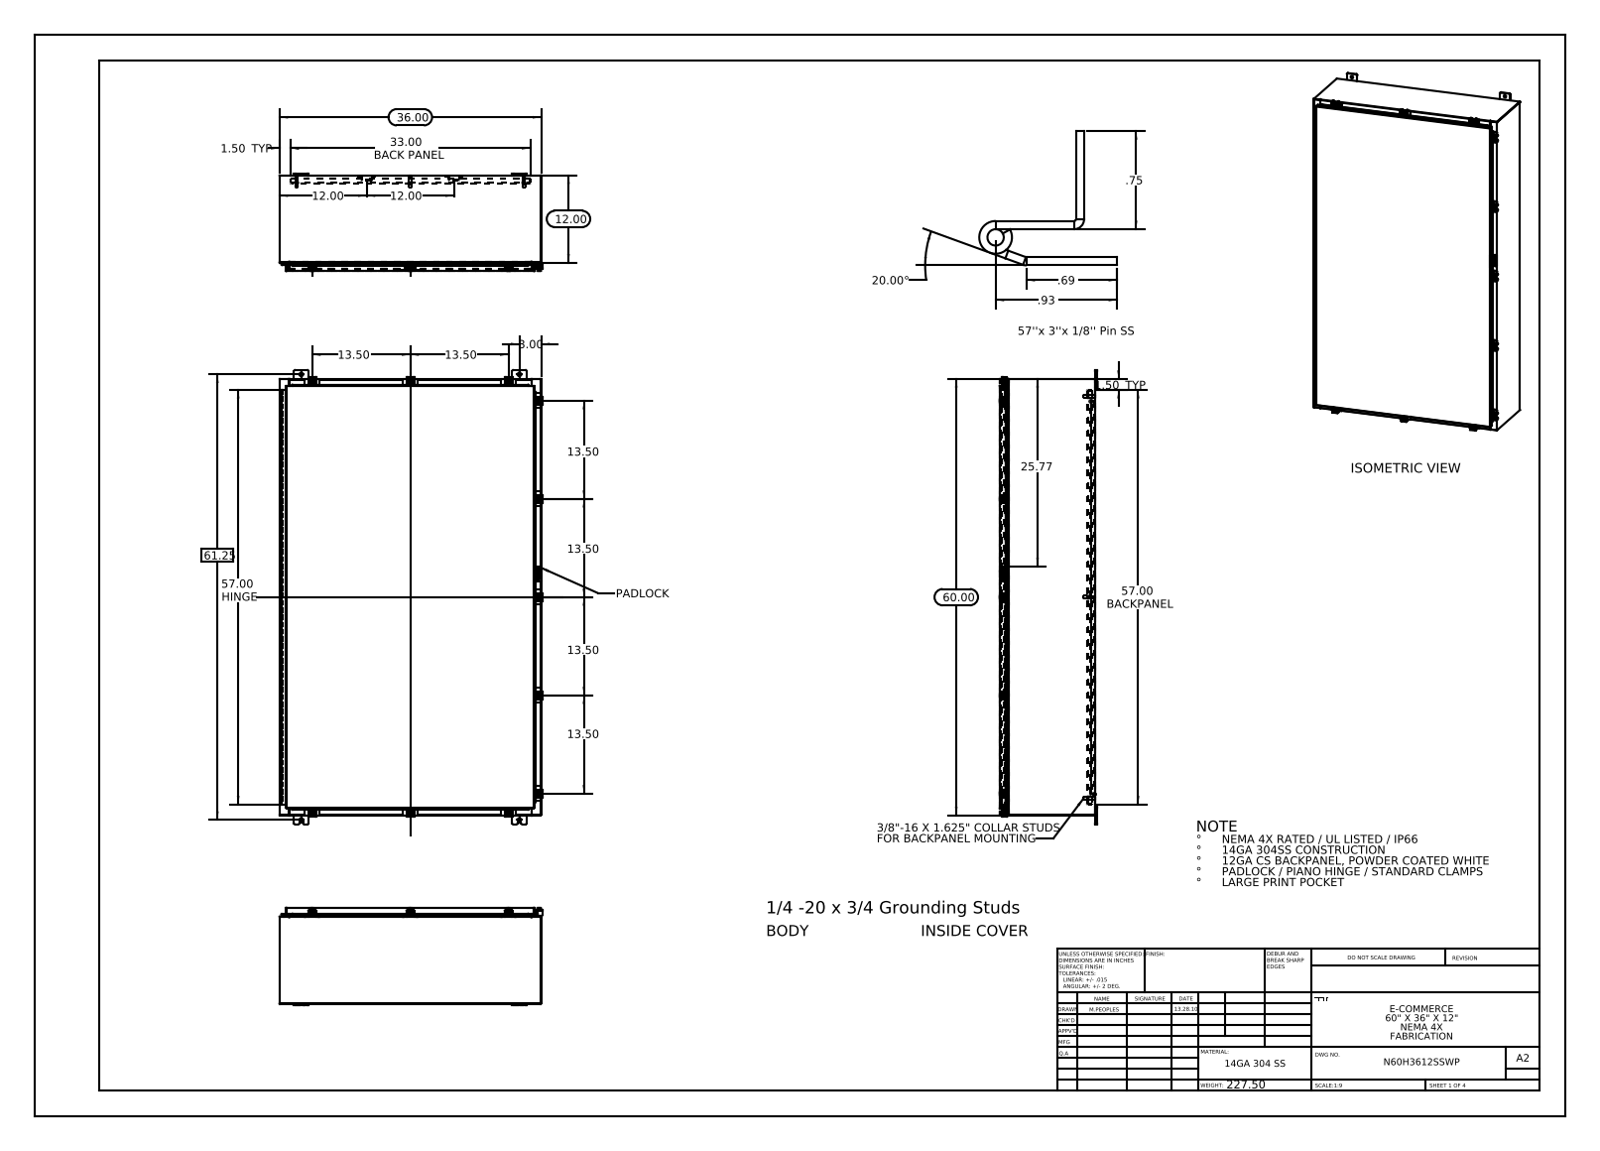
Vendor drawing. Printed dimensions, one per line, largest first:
61.25
60.00
57.00 HINGE
57.00 BACKPANEL
36.00
33.00 BACK PANEL
25.77
20.00°
13.50
13.50
13.50
13.50
13.50
13.50
12.00
12.00
12.00
3.00
1.50 TYP
1.50 TYP
.93
.75
.69
